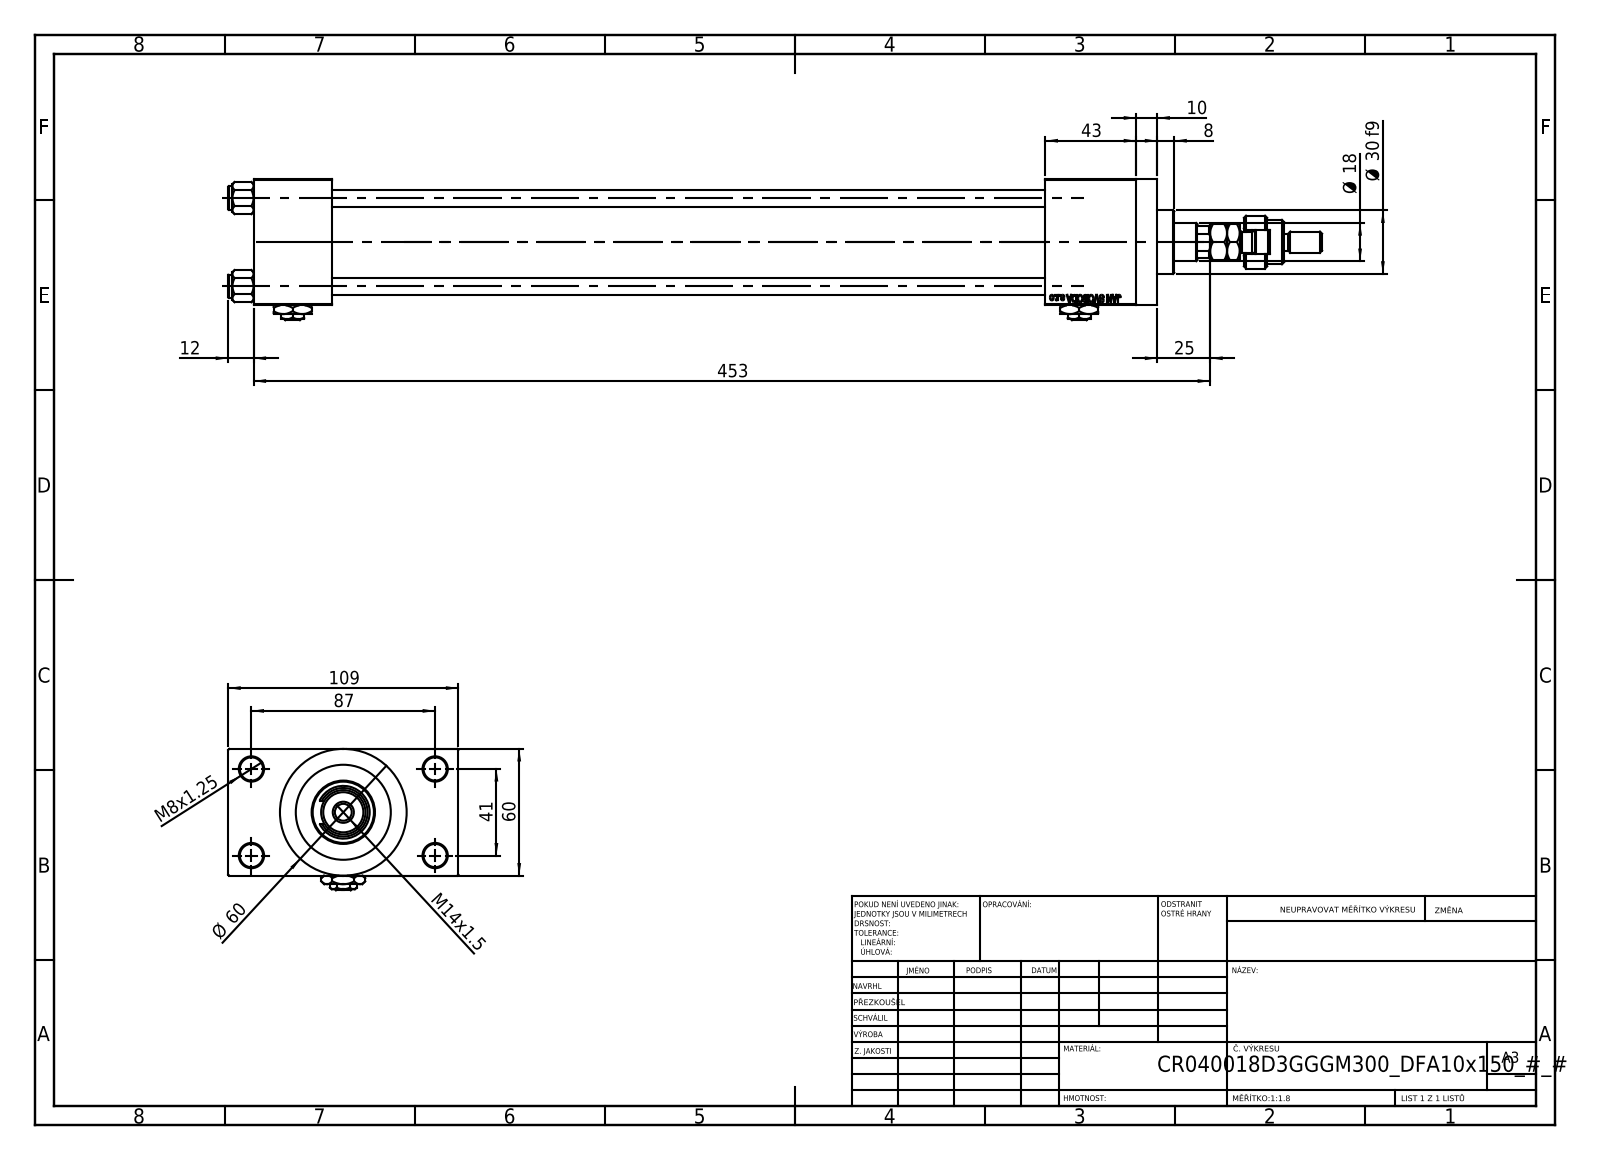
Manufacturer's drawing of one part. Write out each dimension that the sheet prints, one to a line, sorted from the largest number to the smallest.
453
109
87
Ø 60
60
43
41
Ø 30 f9
25
Ø 18
M14x1.5
12
10
8
M8x1.25
